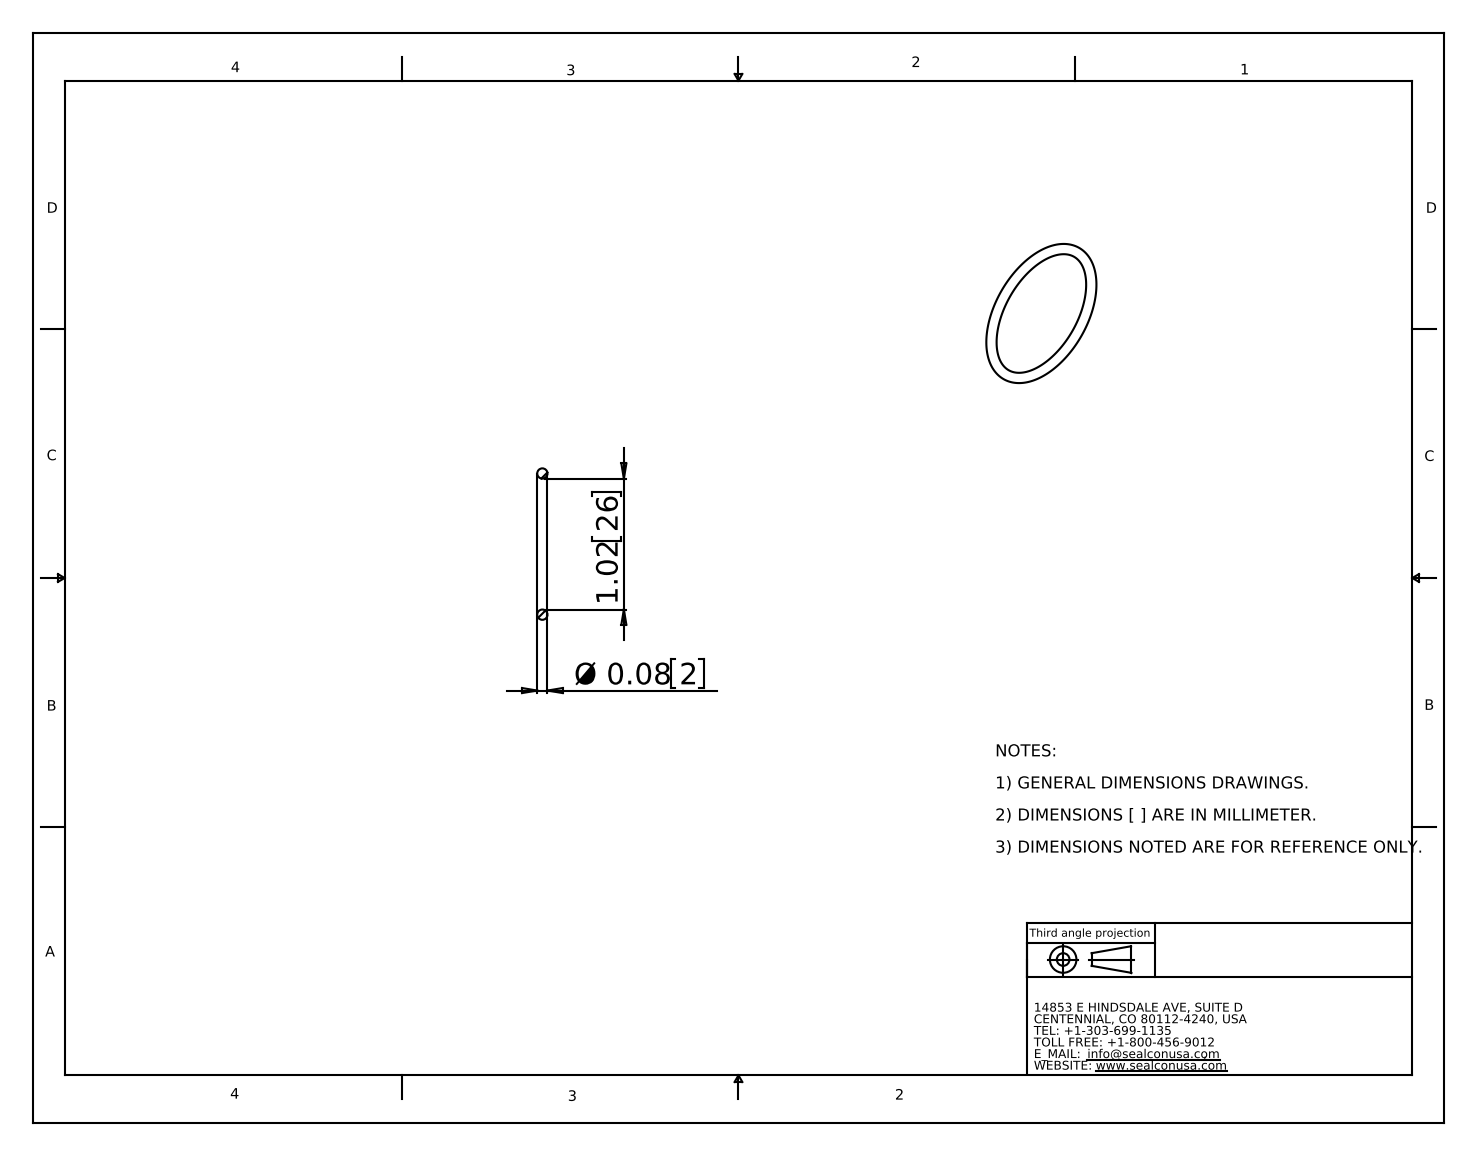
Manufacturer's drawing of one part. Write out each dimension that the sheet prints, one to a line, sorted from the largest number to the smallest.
1.02 26
Ø 0.08 2
